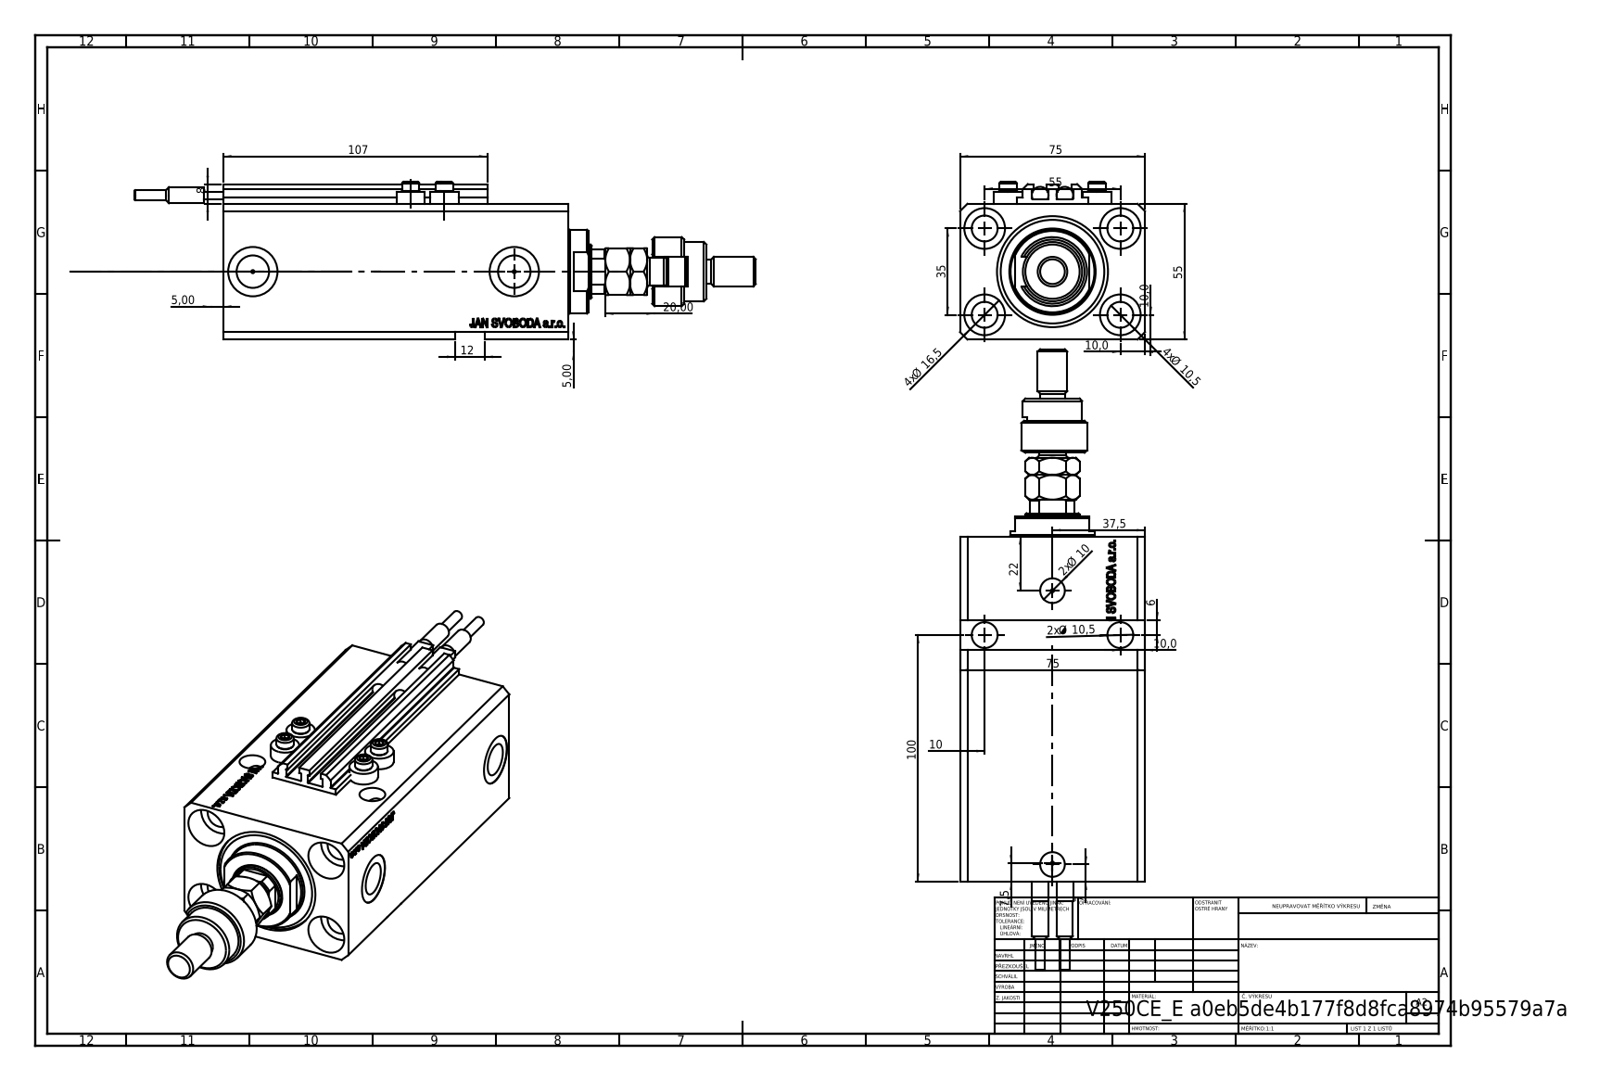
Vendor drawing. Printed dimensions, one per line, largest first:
107
100
75
75
55
55
37,5
35
22
20,00
4x Ø 16,5
12
4x Ø 10,5
2x Ø 10,5
10,0
10,0
2x Ø 10
10,0
10
8
7,5
7
6
5,00
5,00
